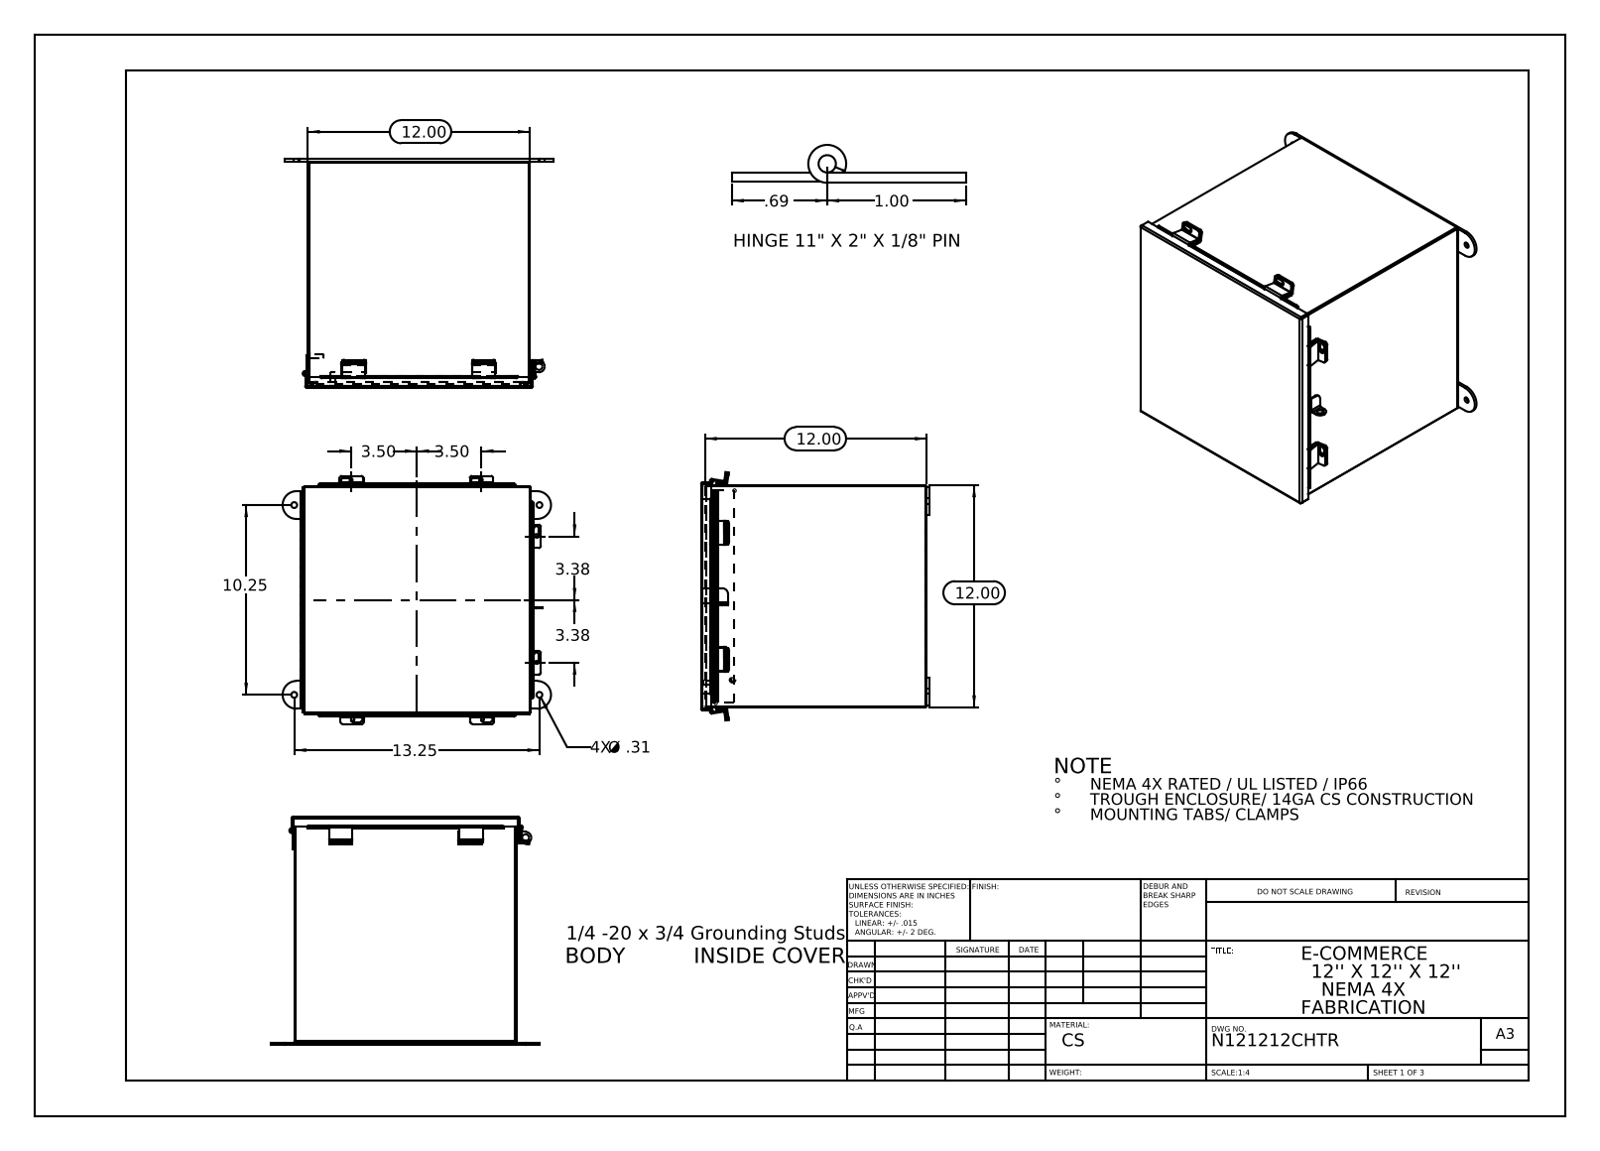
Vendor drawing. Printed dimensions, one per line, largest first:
13.25
12.00
12.00
12.00
10.25
3.50
3.50
3.38
3.38
1.00
.69
4X Ø .31
